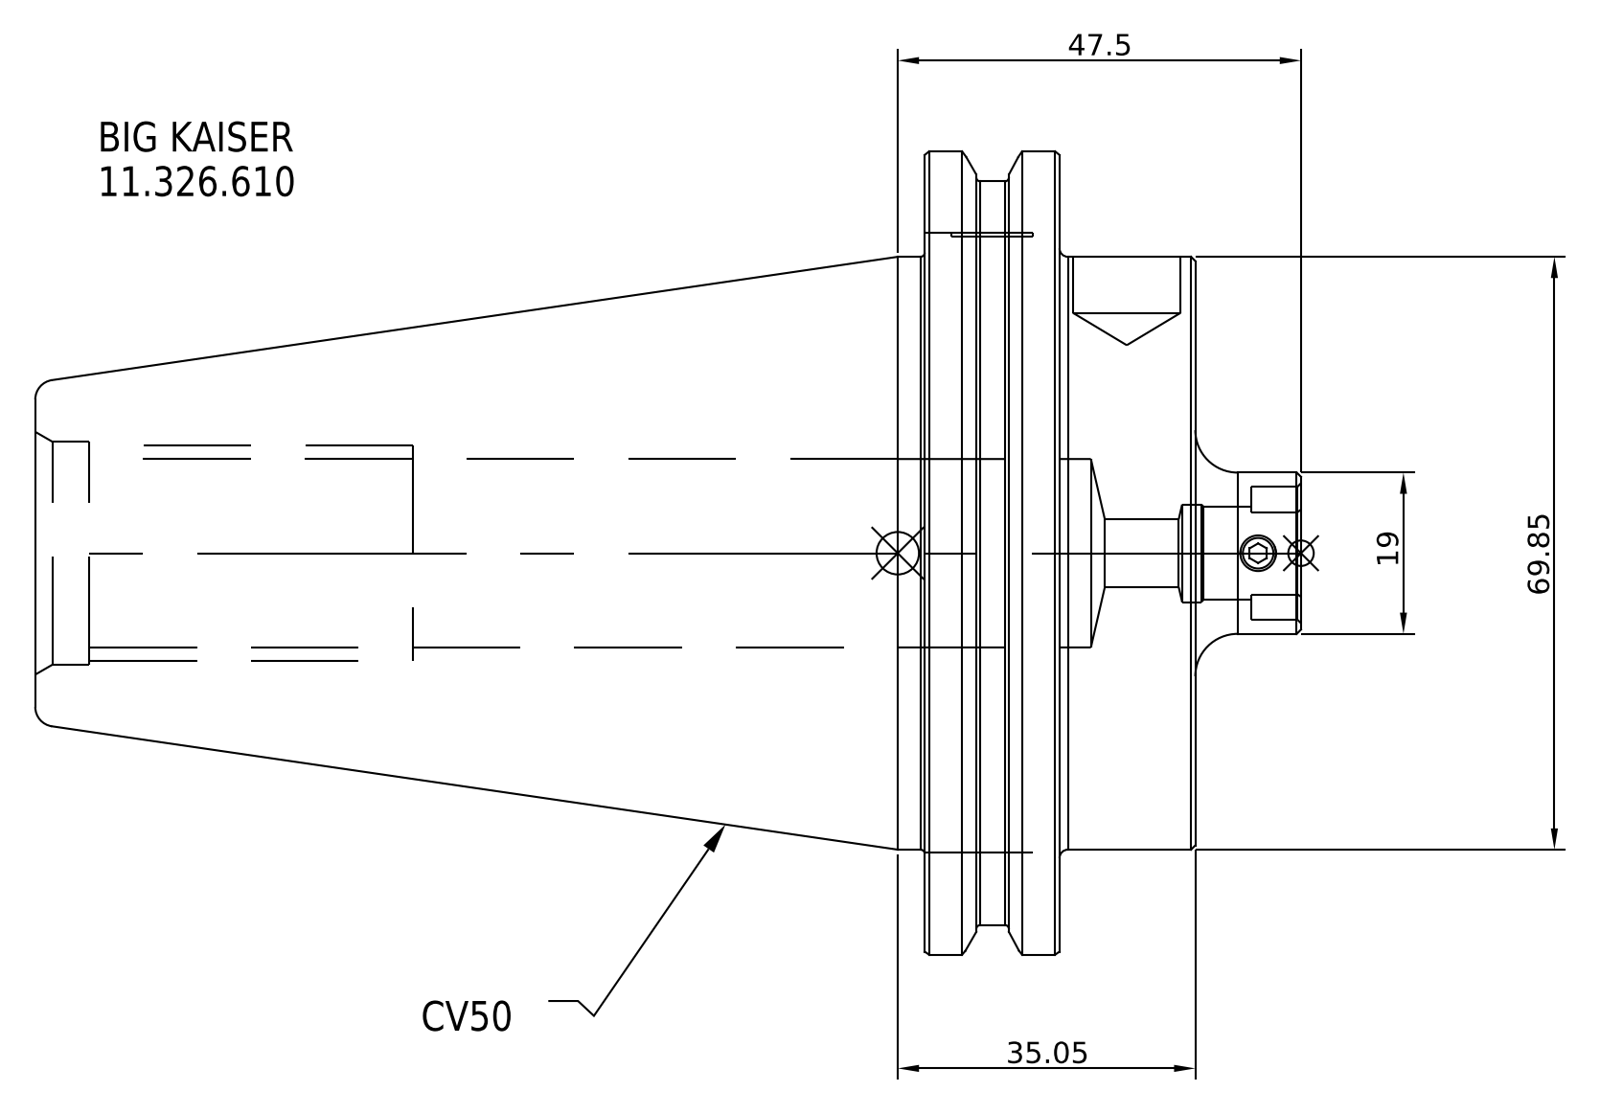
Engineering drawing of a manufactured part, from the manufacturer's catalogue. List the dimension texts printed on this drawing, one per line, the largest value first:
69.85
47.5
35.05
19
